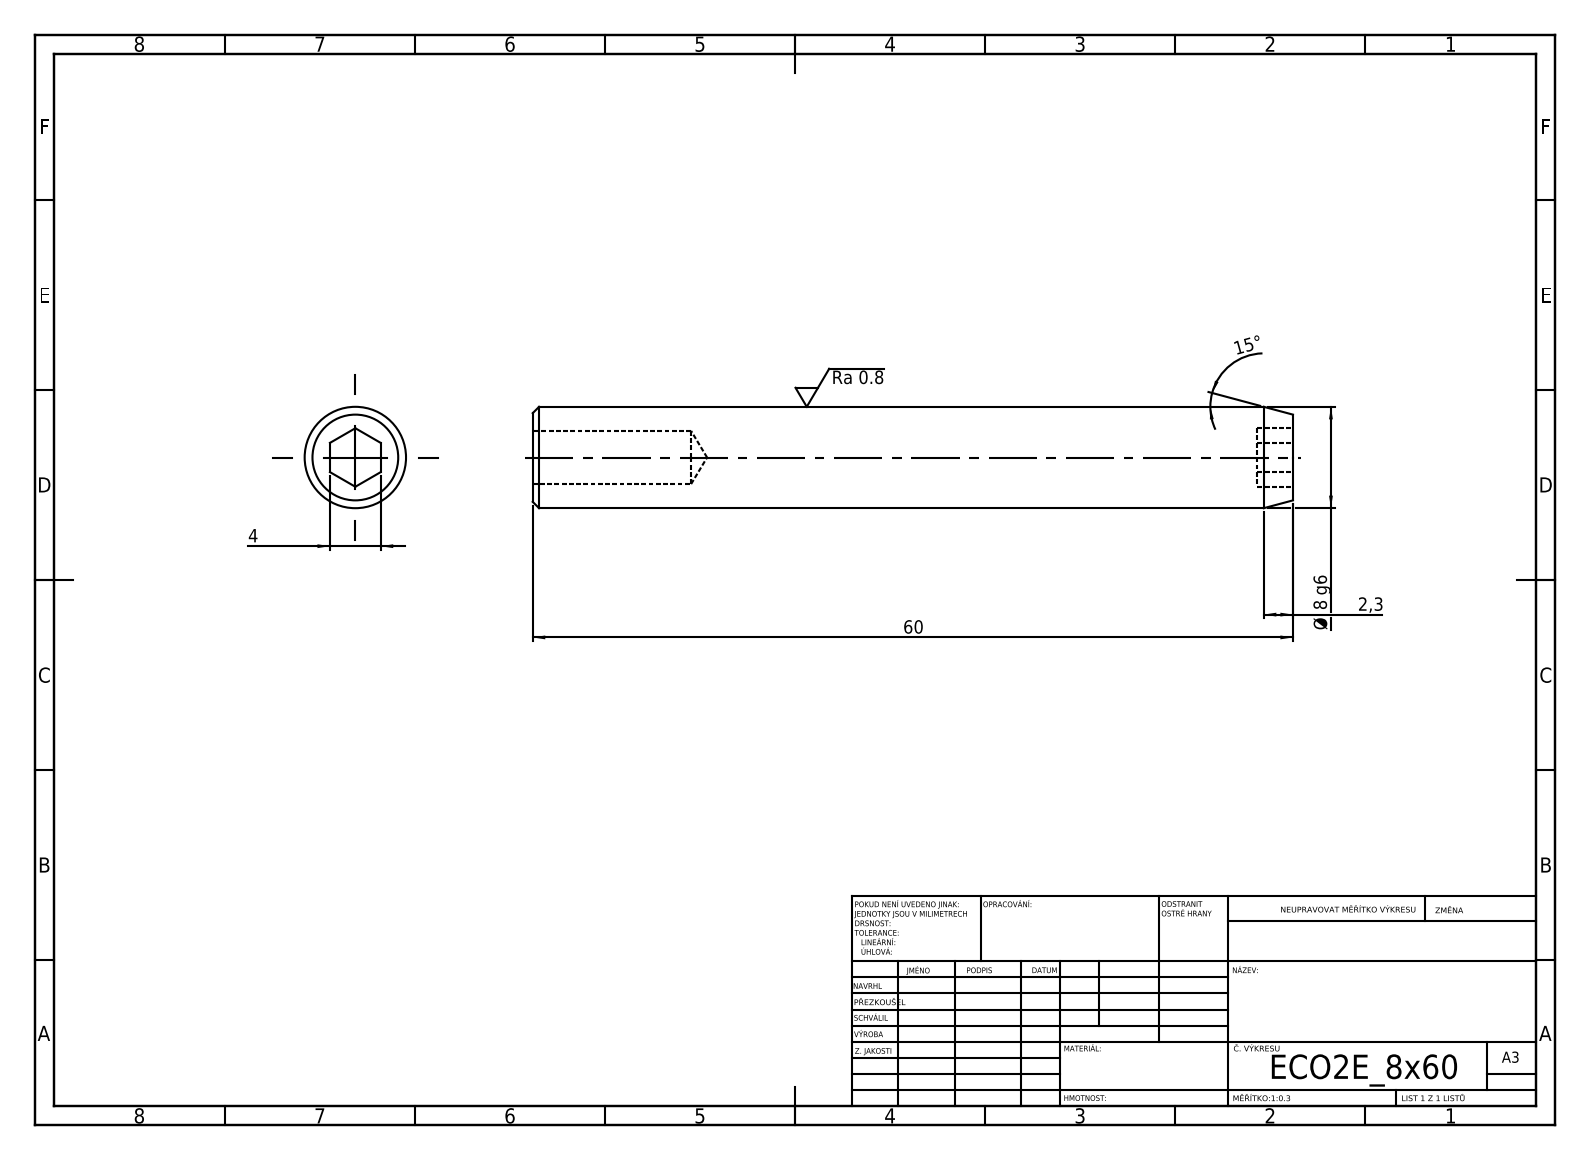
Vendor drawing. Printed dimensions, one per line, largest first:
60
15°
Ø 8 g6
4
2,3
